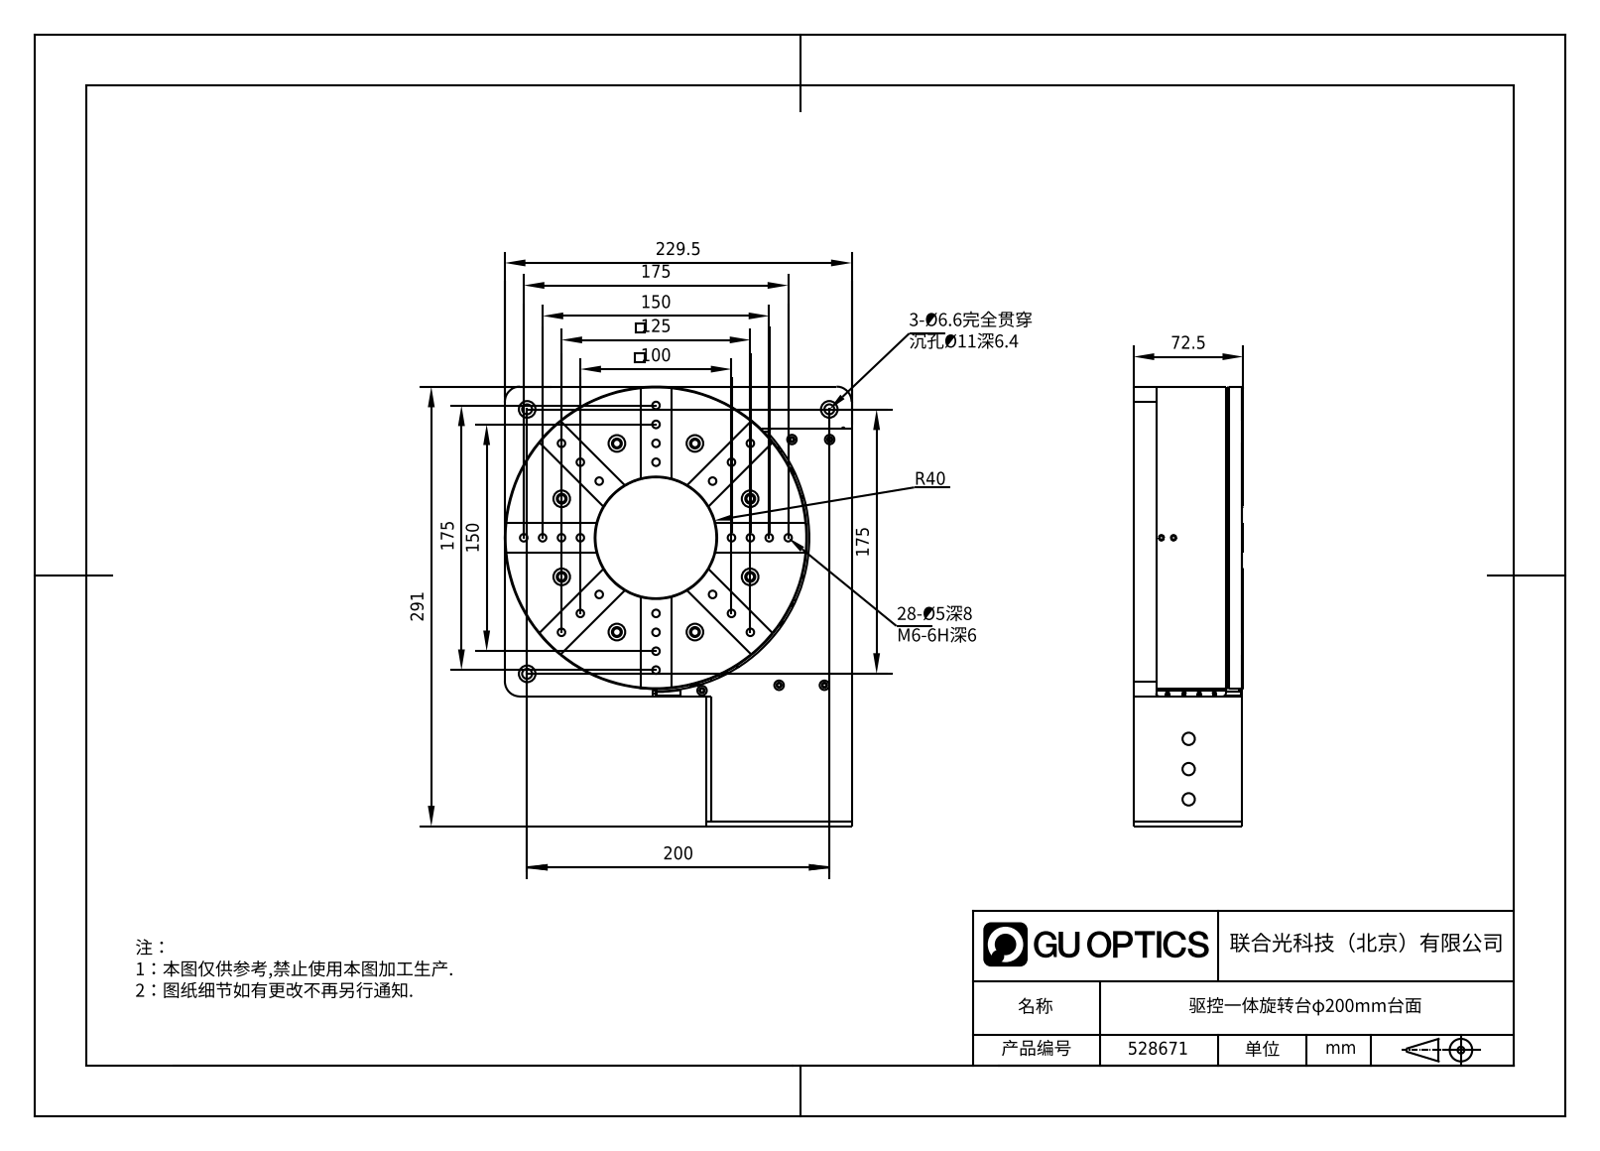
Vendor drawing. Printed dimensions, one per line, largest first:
291
229.5
200
175
175
175
150
150
125
100
72.5
